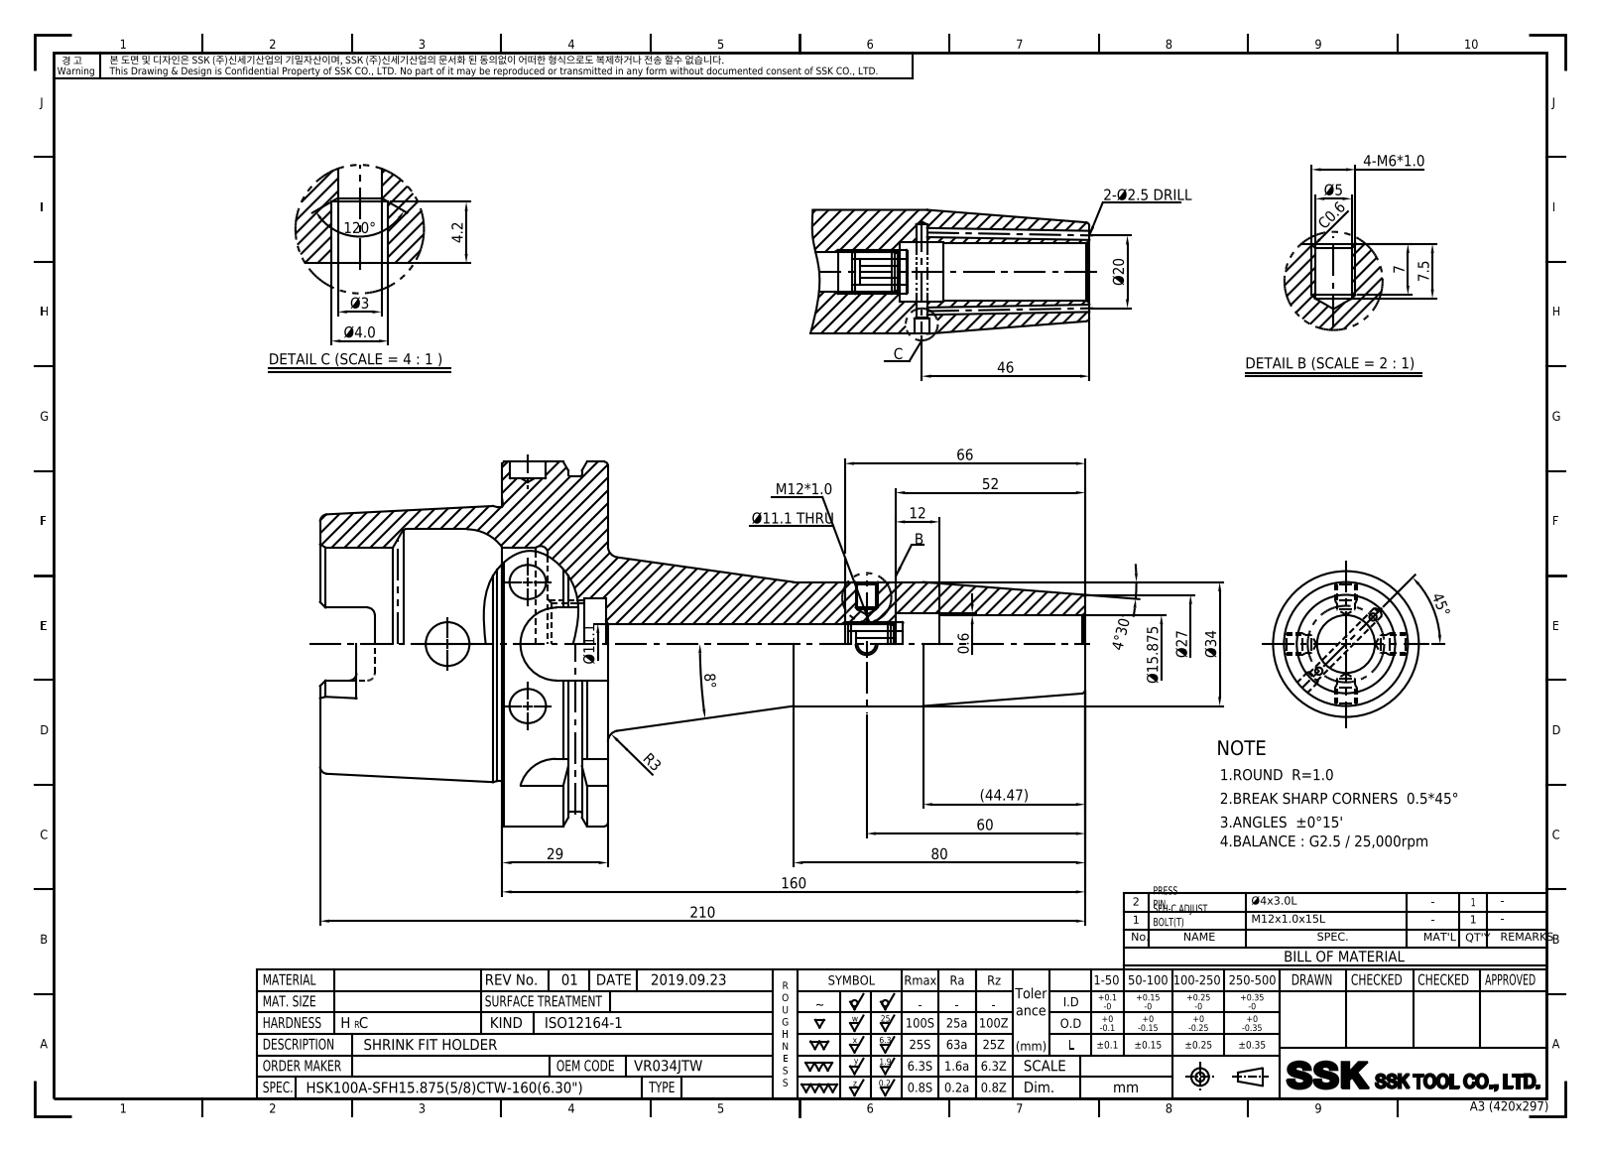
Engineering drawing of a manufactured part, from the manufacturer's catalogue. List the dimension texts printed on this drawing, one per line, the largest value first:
210
160
120°
80
66
60
52
46
45°
(44.47)
Ø34
29
Ø27
Ø20
Ø15.875
12
Ø11.1
8°
7.5
7
4-M6*1.0
Ø5
4.2
4°30'
Ø4.0
Ø3
R3
C0.6
0.6
